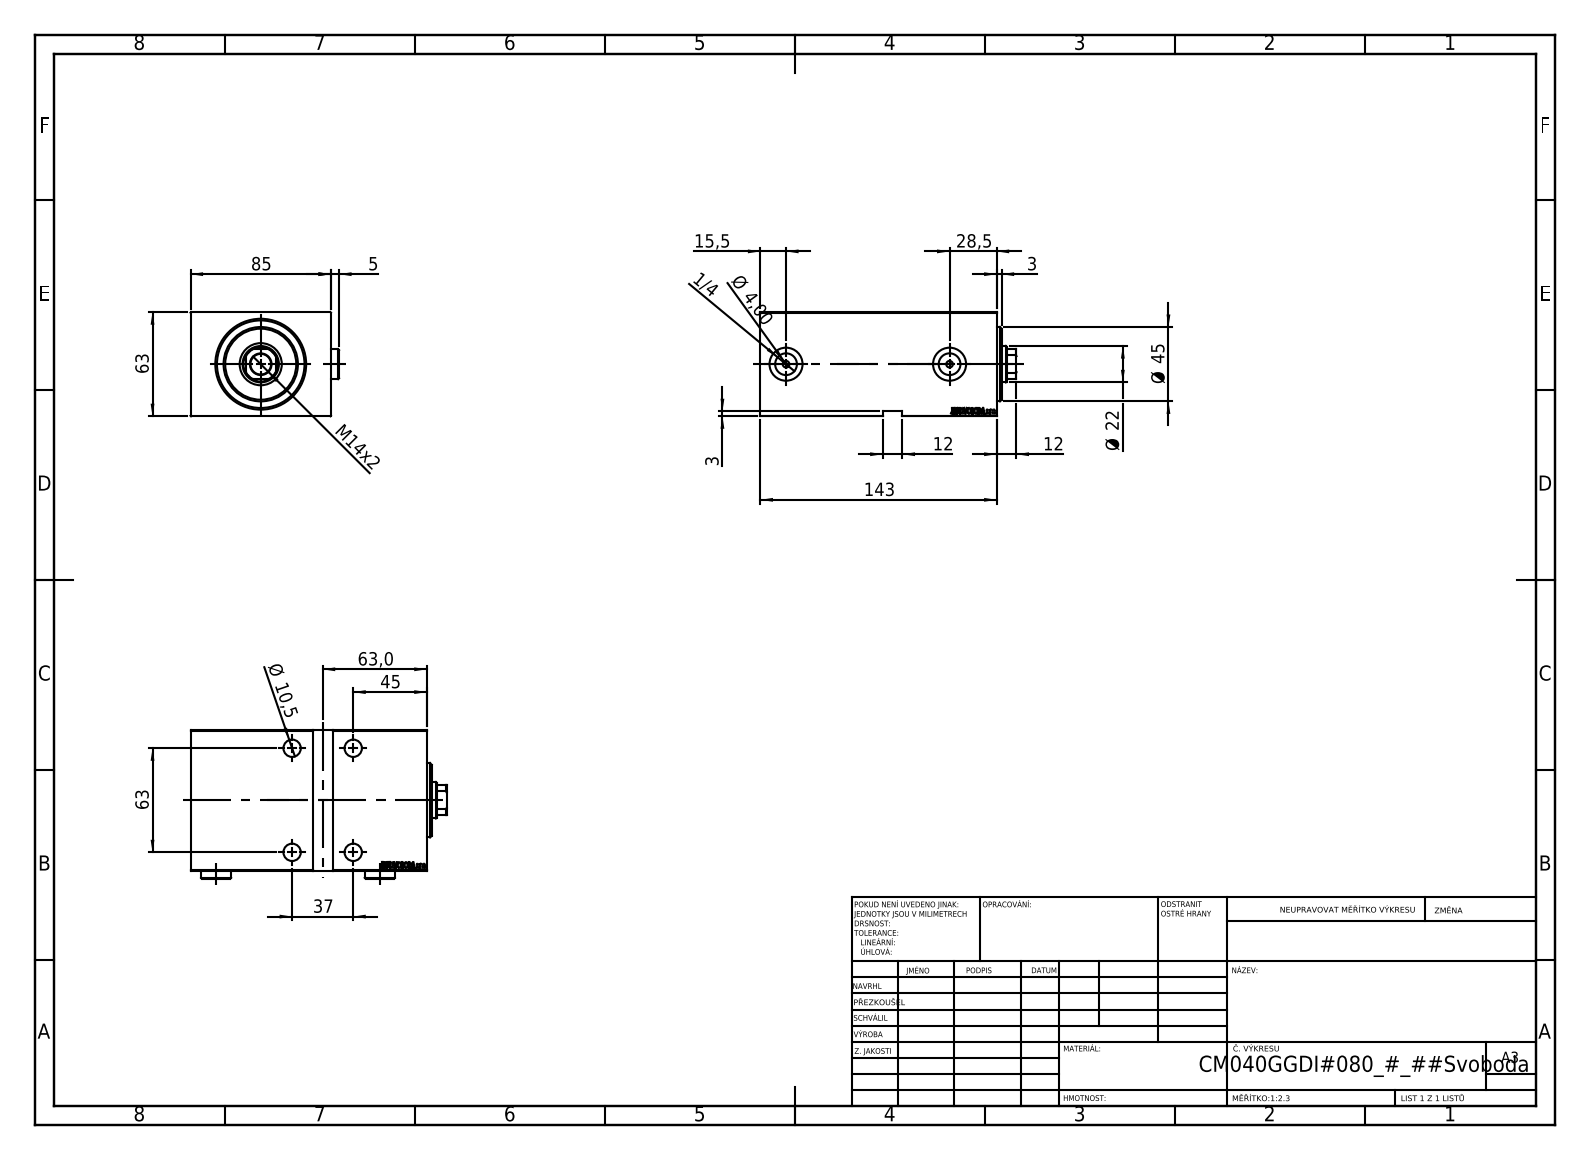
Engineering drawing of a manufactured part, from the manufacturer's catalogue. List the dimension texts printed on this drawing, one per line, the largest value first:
143
85
63
63
63,0
Ø 45
45
37
28,5
Ø 22
15,5
M14x2
12
12
Ø 10,5
5
Ø 4,00
3
3
1/4
